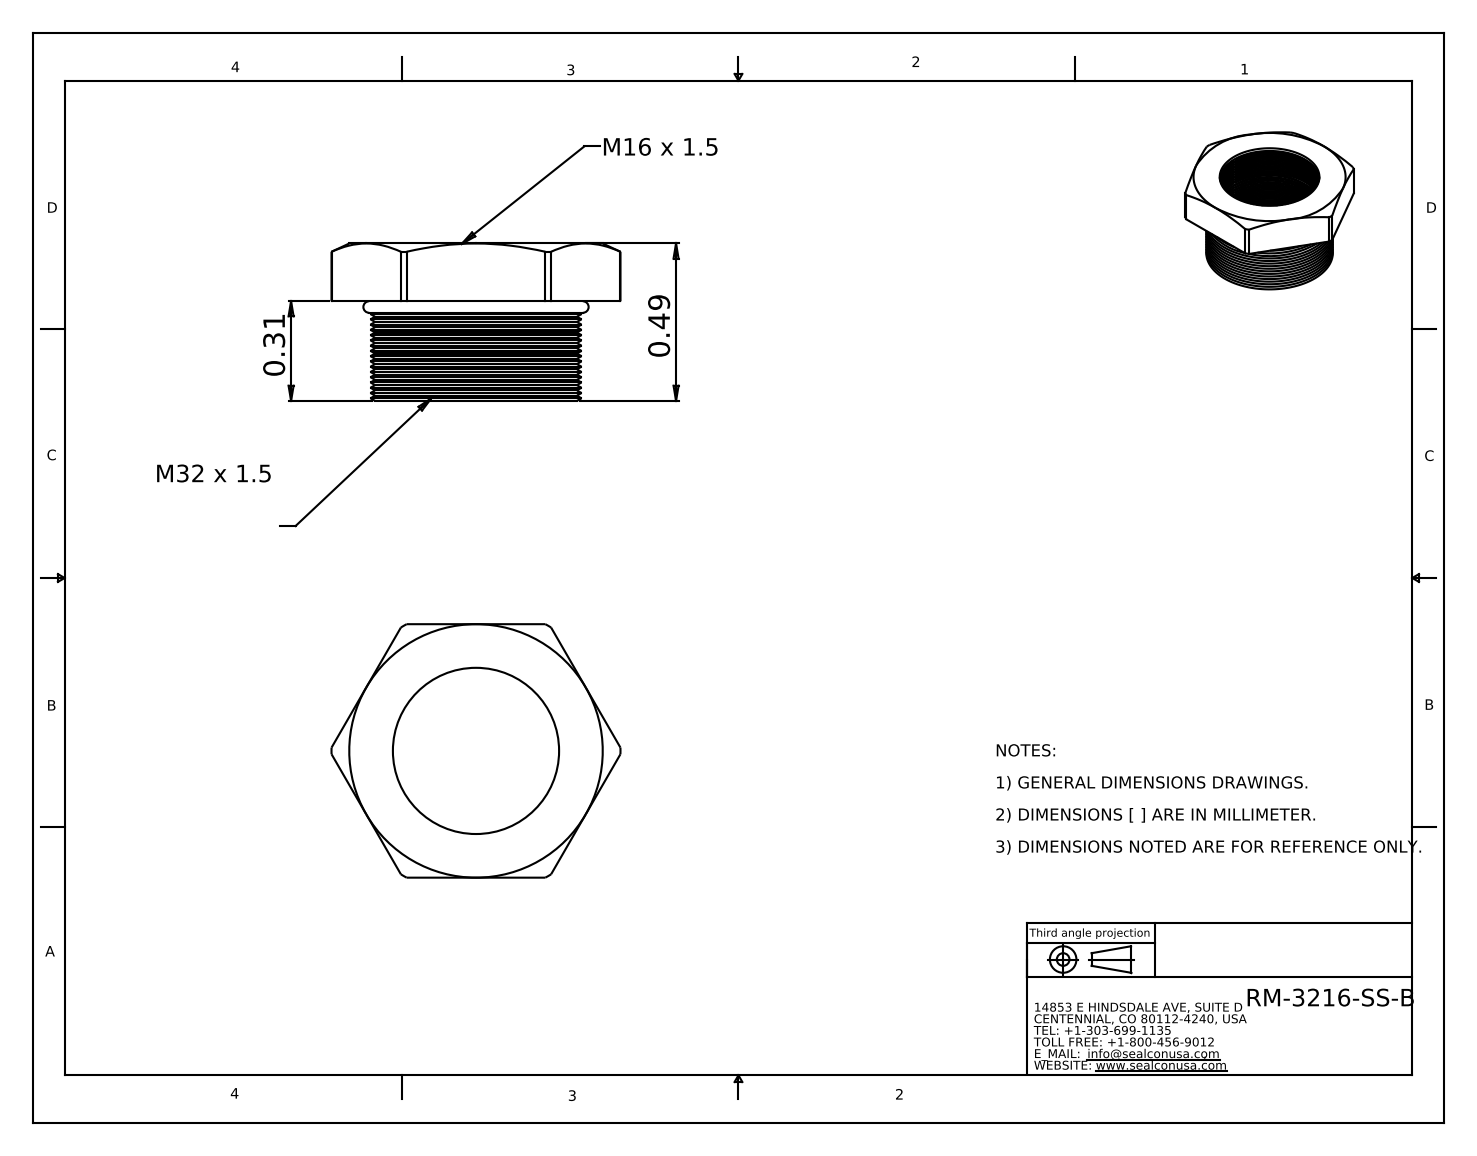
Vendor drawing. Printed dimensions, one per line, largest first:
0.49
0.31
